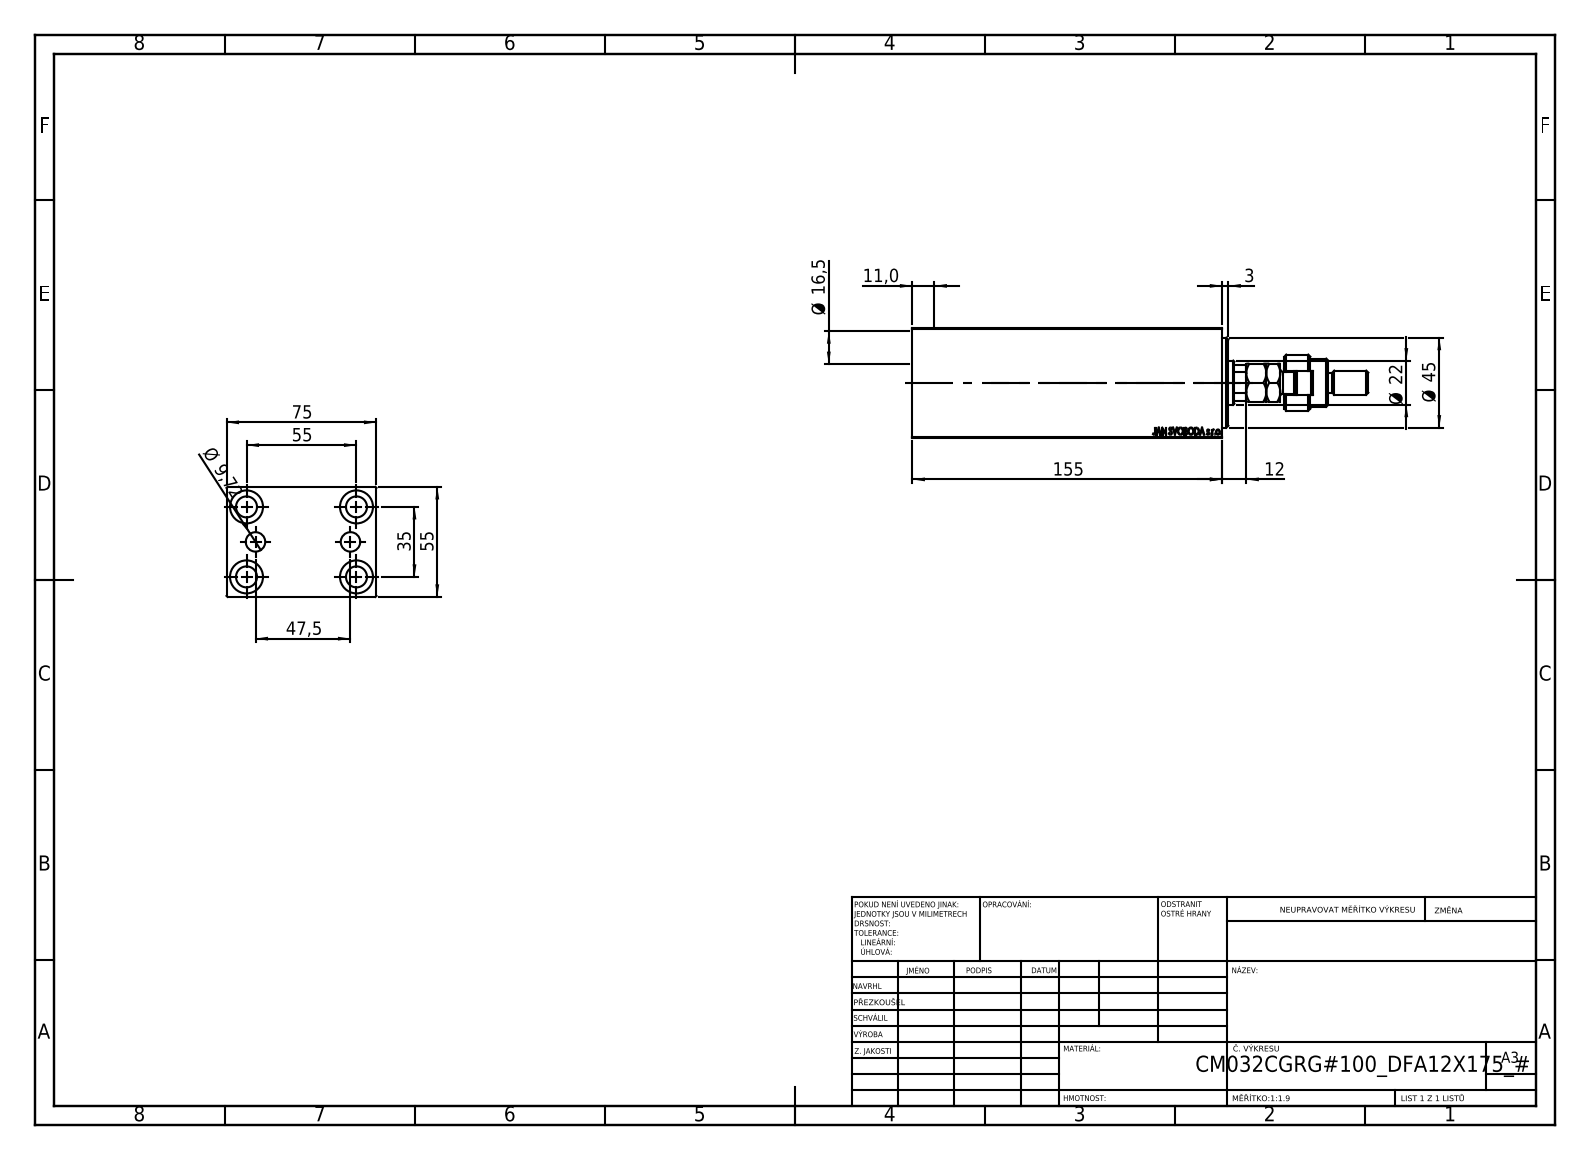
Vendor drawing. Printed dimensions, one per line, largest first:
155
75
55
55
47,5
Ø 45
35
Ø 22
Ø 16,5
12
11,0
Ø 9,72
3
